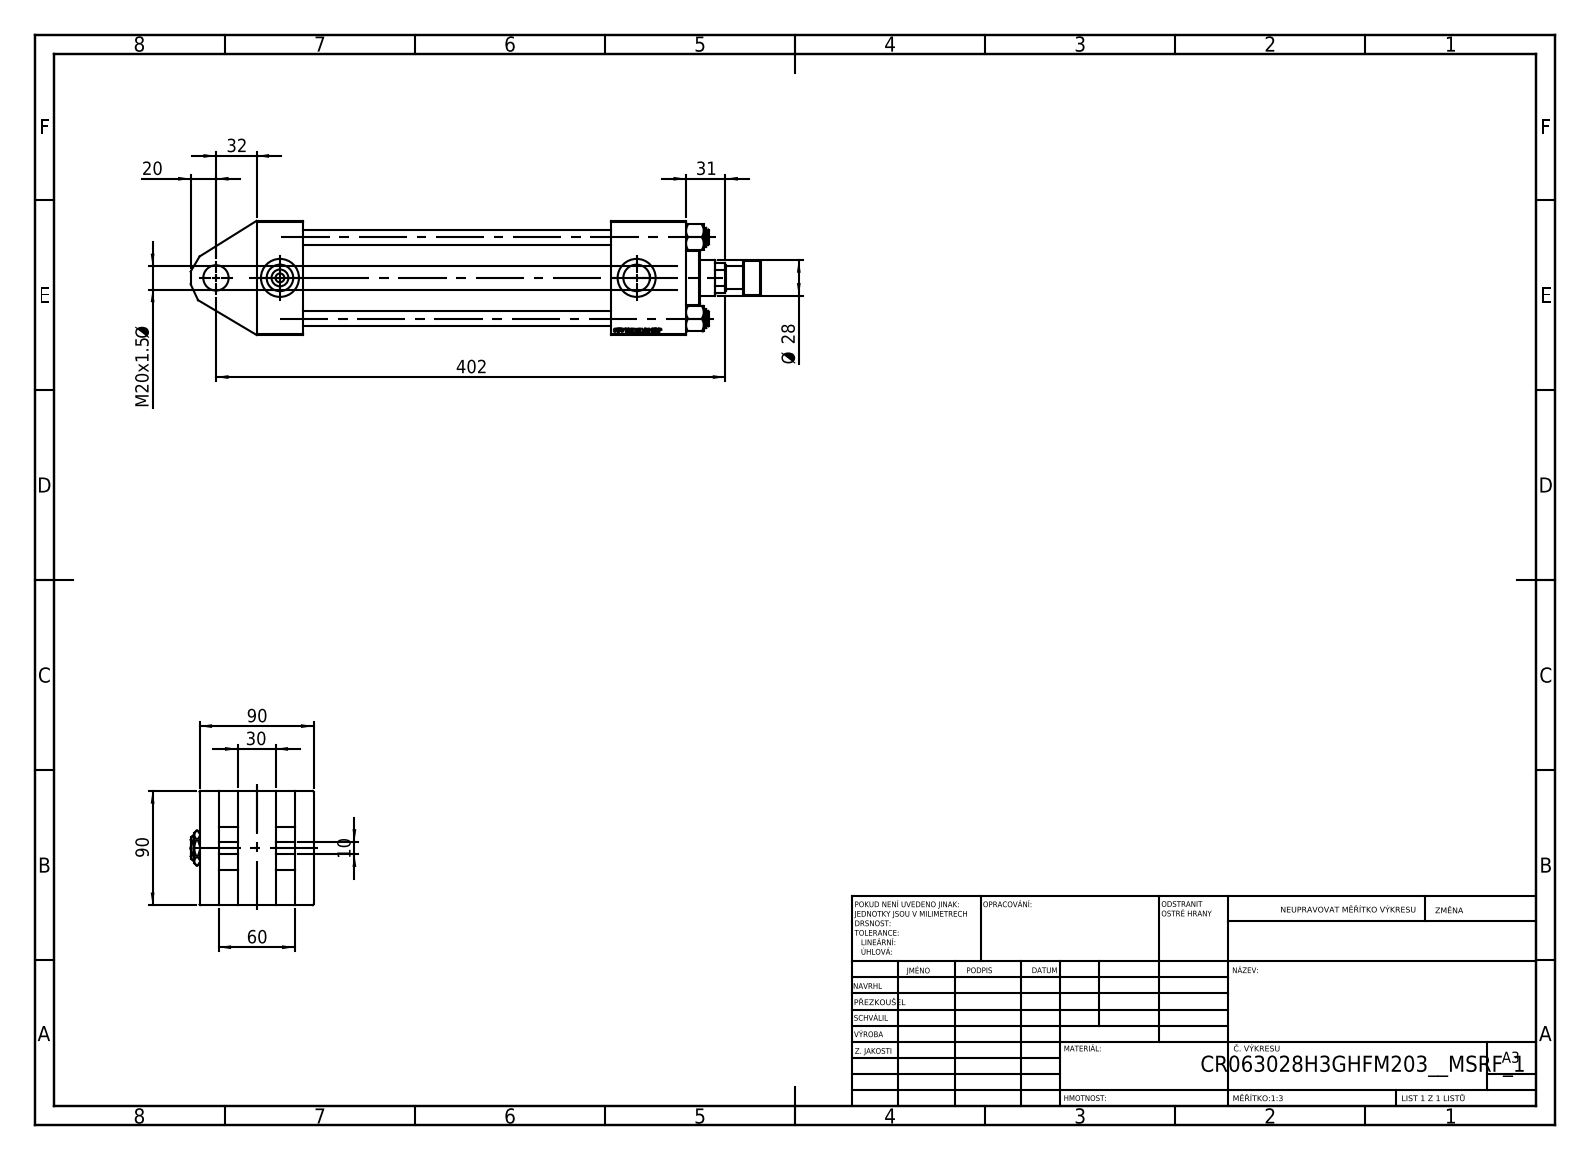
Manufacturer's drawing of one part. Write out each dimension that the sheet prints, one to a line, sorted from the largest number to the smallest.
402
90
90
60
32
31
30
Ø 28
20
M20x1.5 Ø
10
